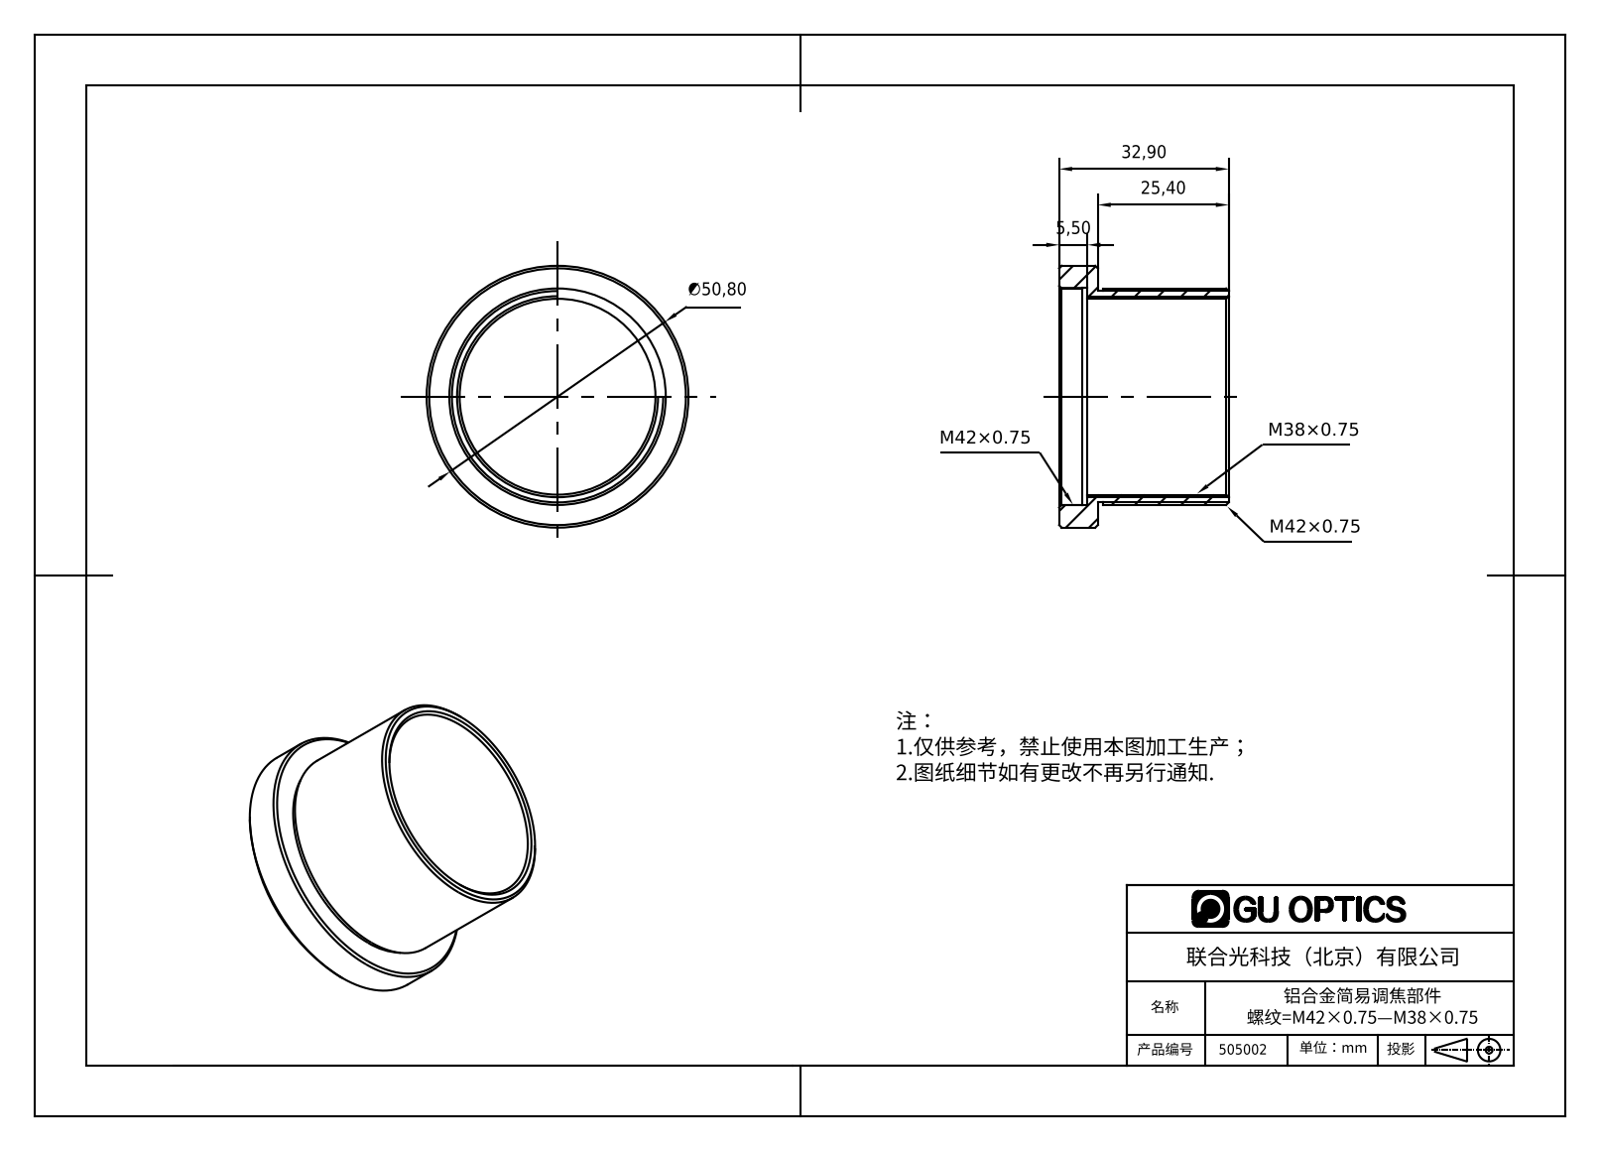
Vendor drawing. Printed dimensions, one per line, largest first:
∅50,80
32,90
25,40
5,50
